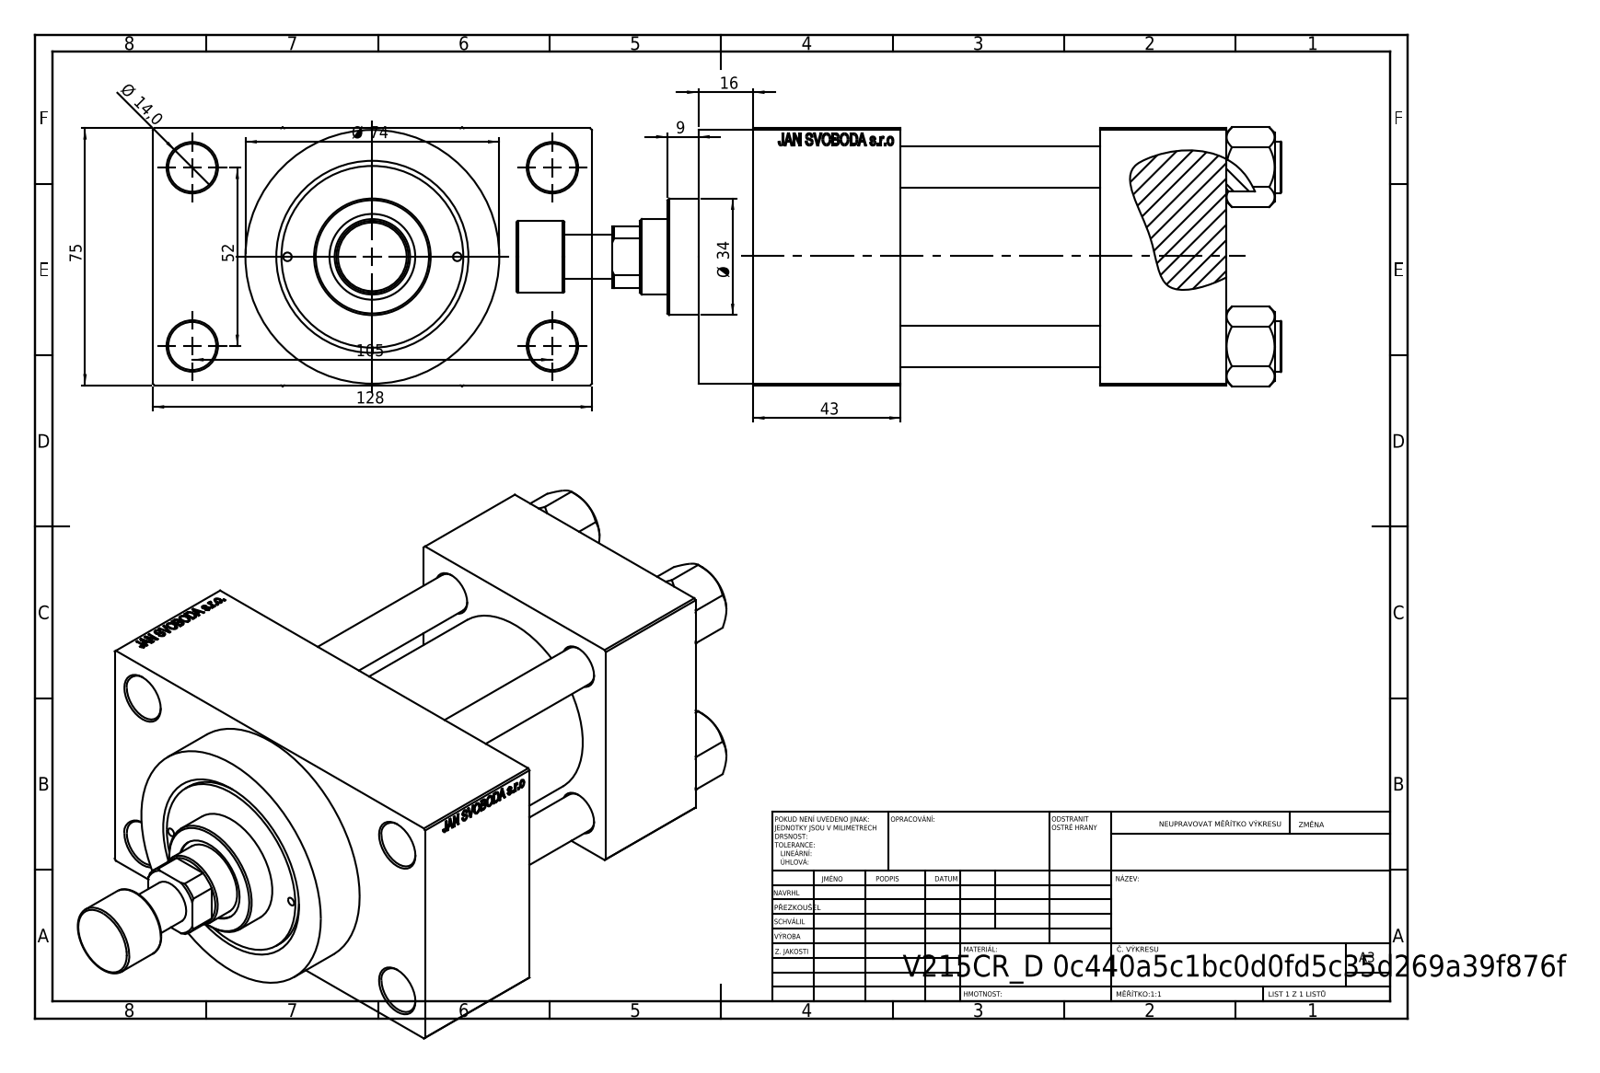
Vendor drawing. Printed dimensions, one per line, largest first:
128
105
75
Ø 74
52
43
Ø 34
16
Ø 14,0
9
